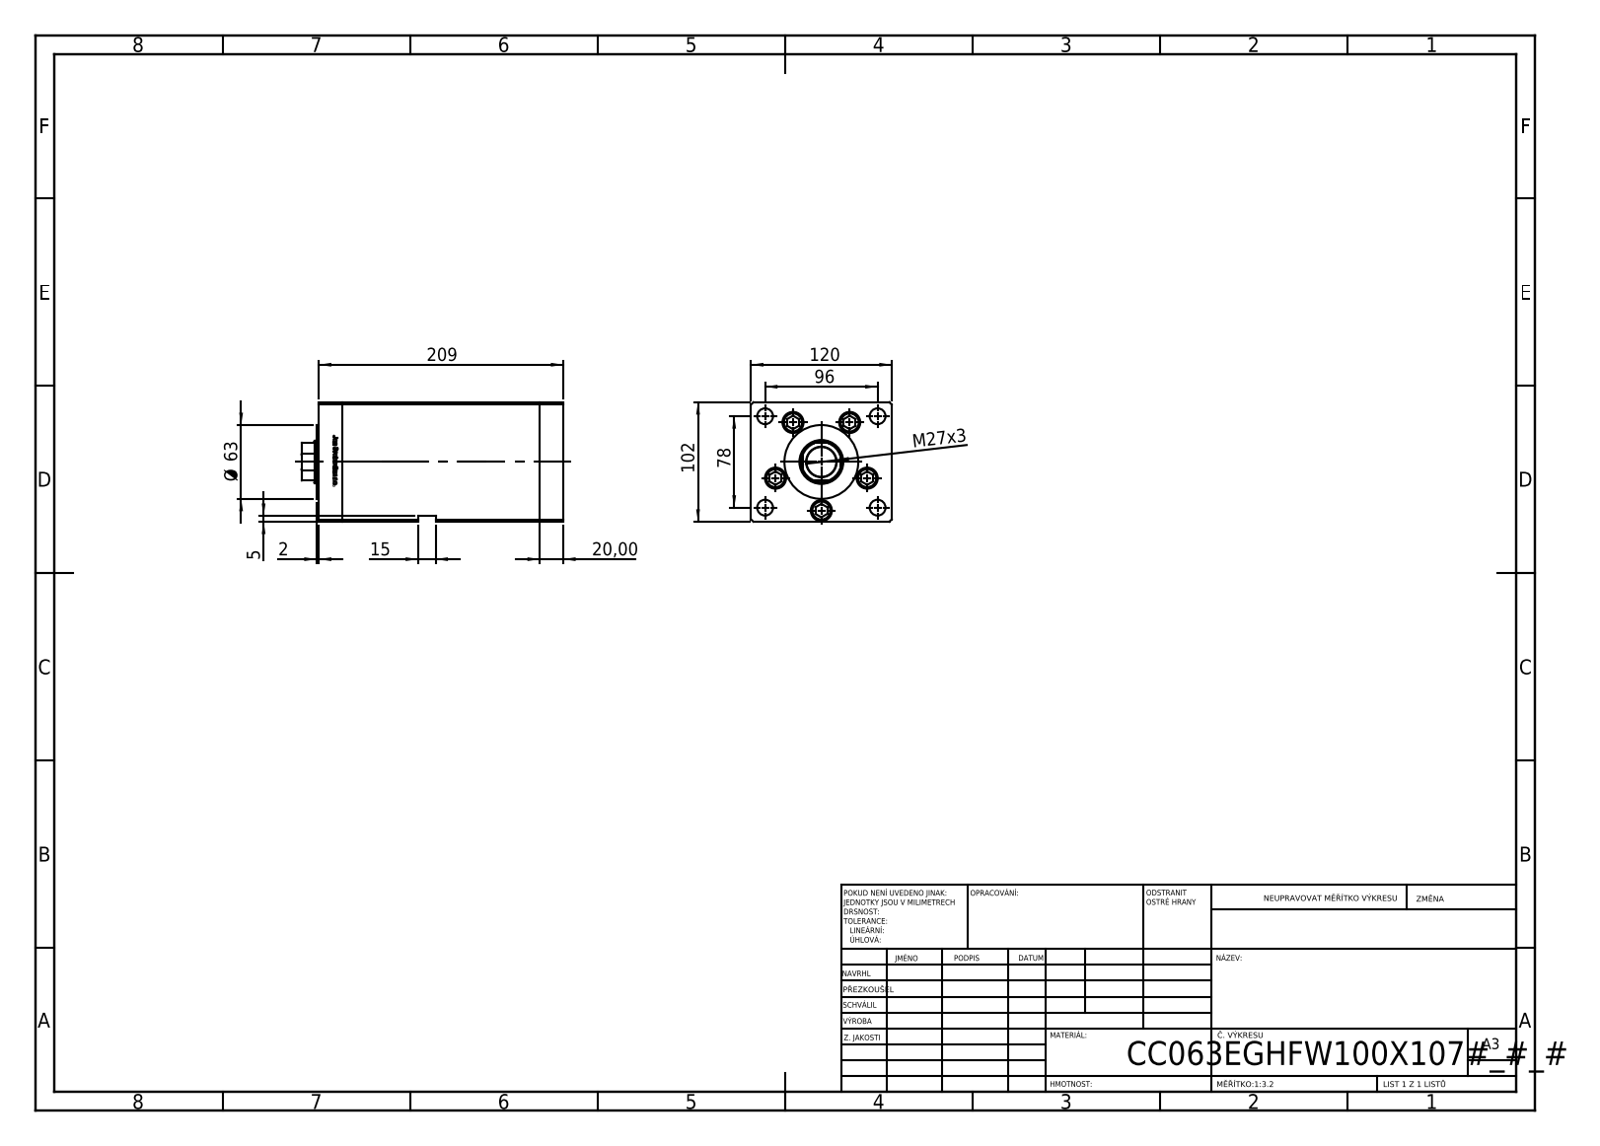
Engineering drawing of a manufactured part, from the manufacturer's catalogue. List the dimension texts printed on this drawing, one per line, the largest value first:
209
120
102
96
78
Ø 63
M27x3
20,00
15
5
2
